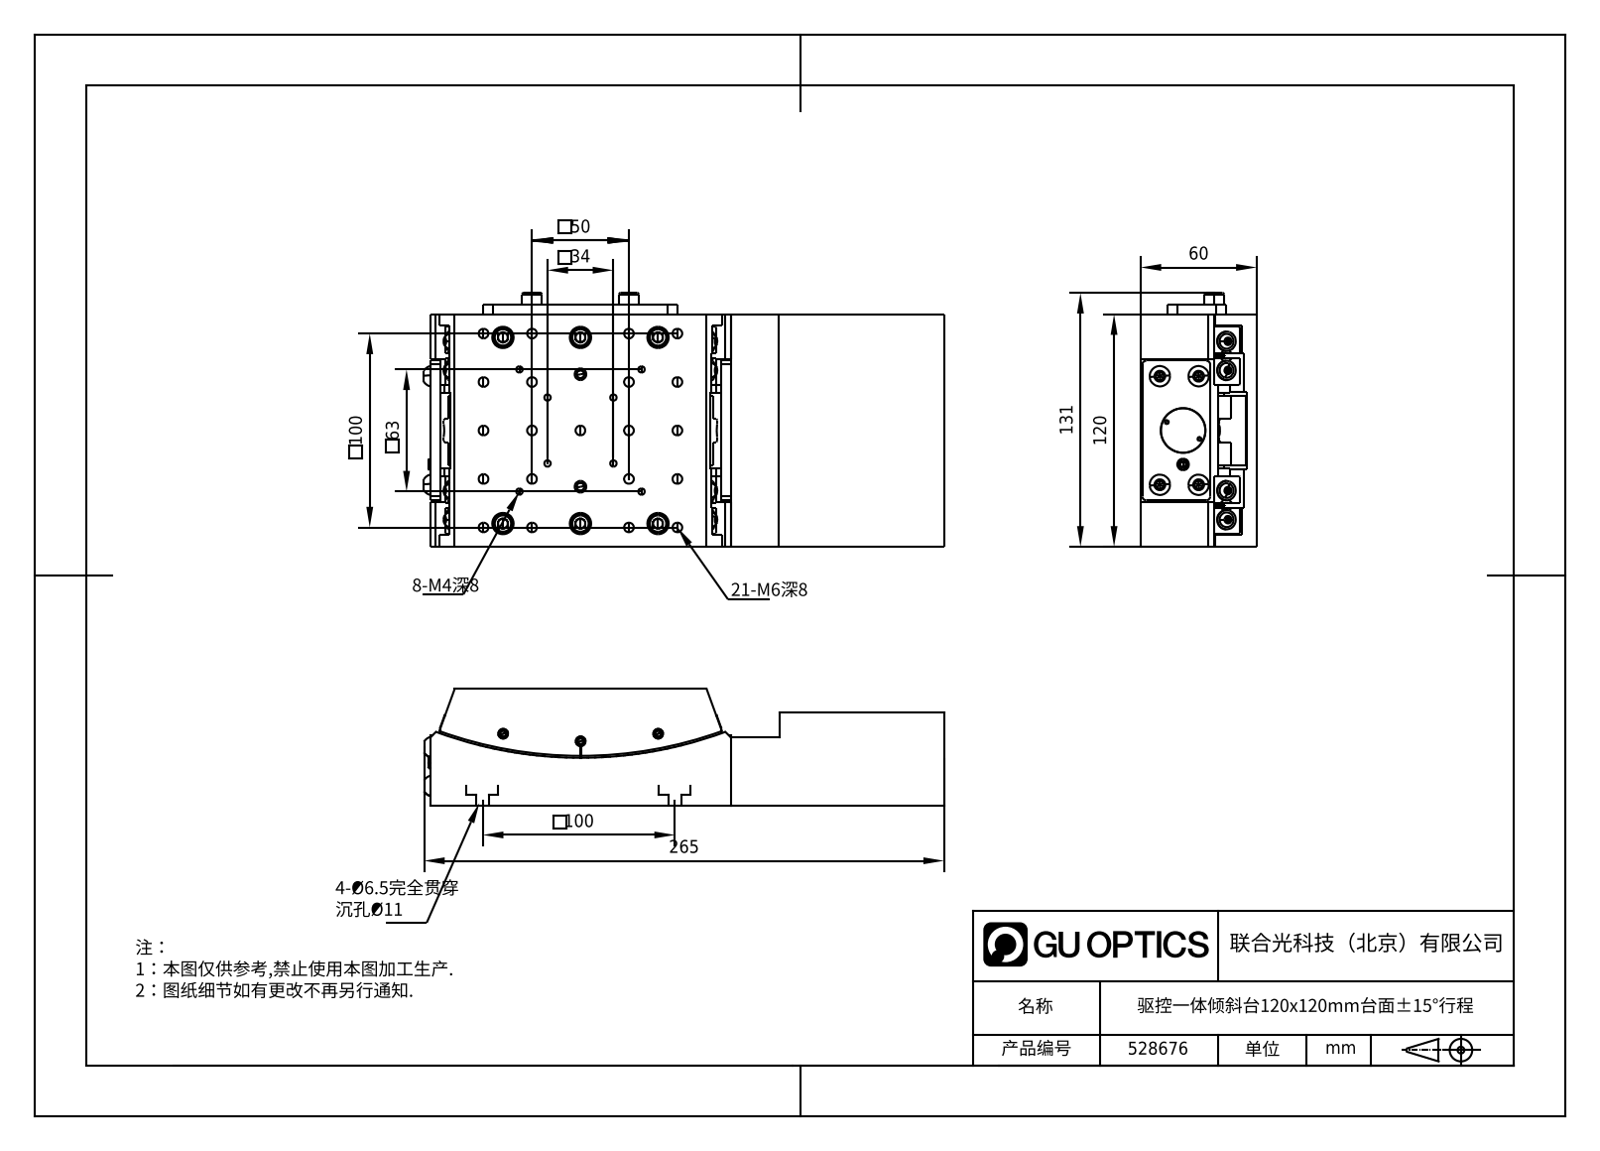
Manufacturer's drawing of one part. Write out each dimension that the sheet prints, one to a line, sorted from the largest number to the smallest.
265
131
120
100
100
63
60
50
34
